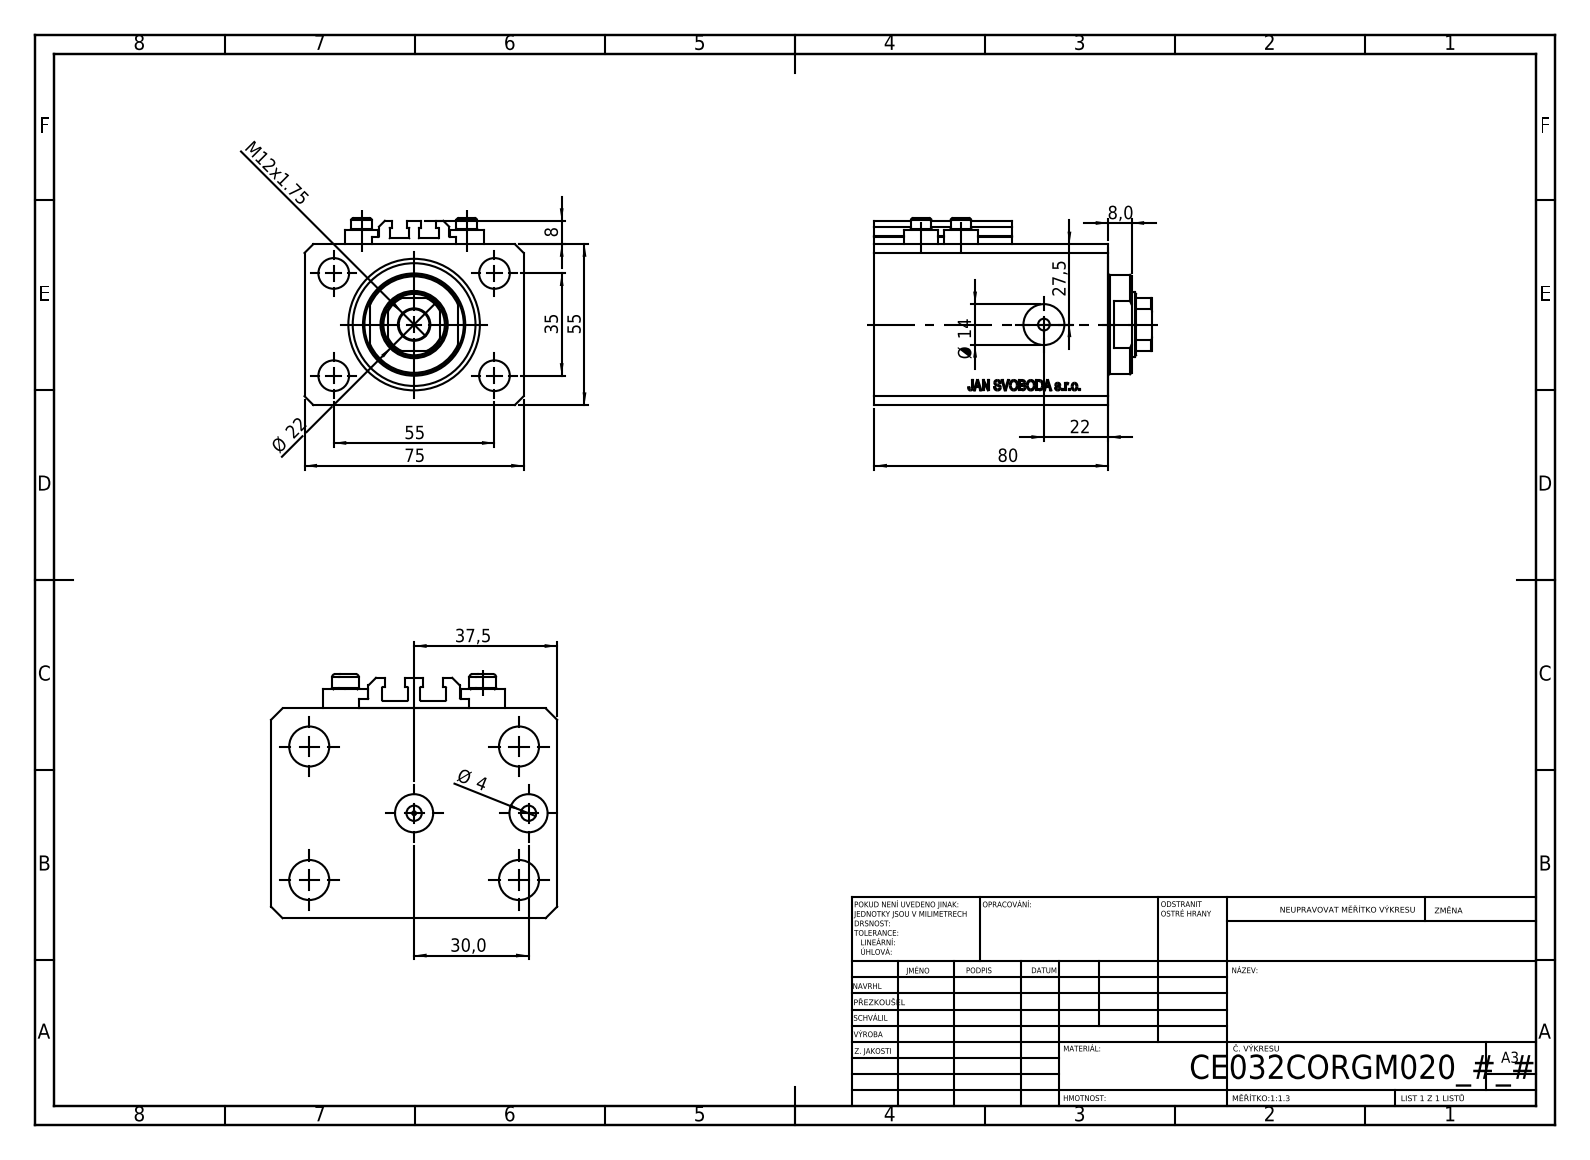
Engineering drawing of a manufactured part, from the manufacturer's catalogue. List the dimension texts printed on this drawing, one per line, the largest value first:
80
75
55
55
37,5
35
30,0
27,5
Ø 22
22
Ø 14
M12x1.75
8
8,0
Ø 4
